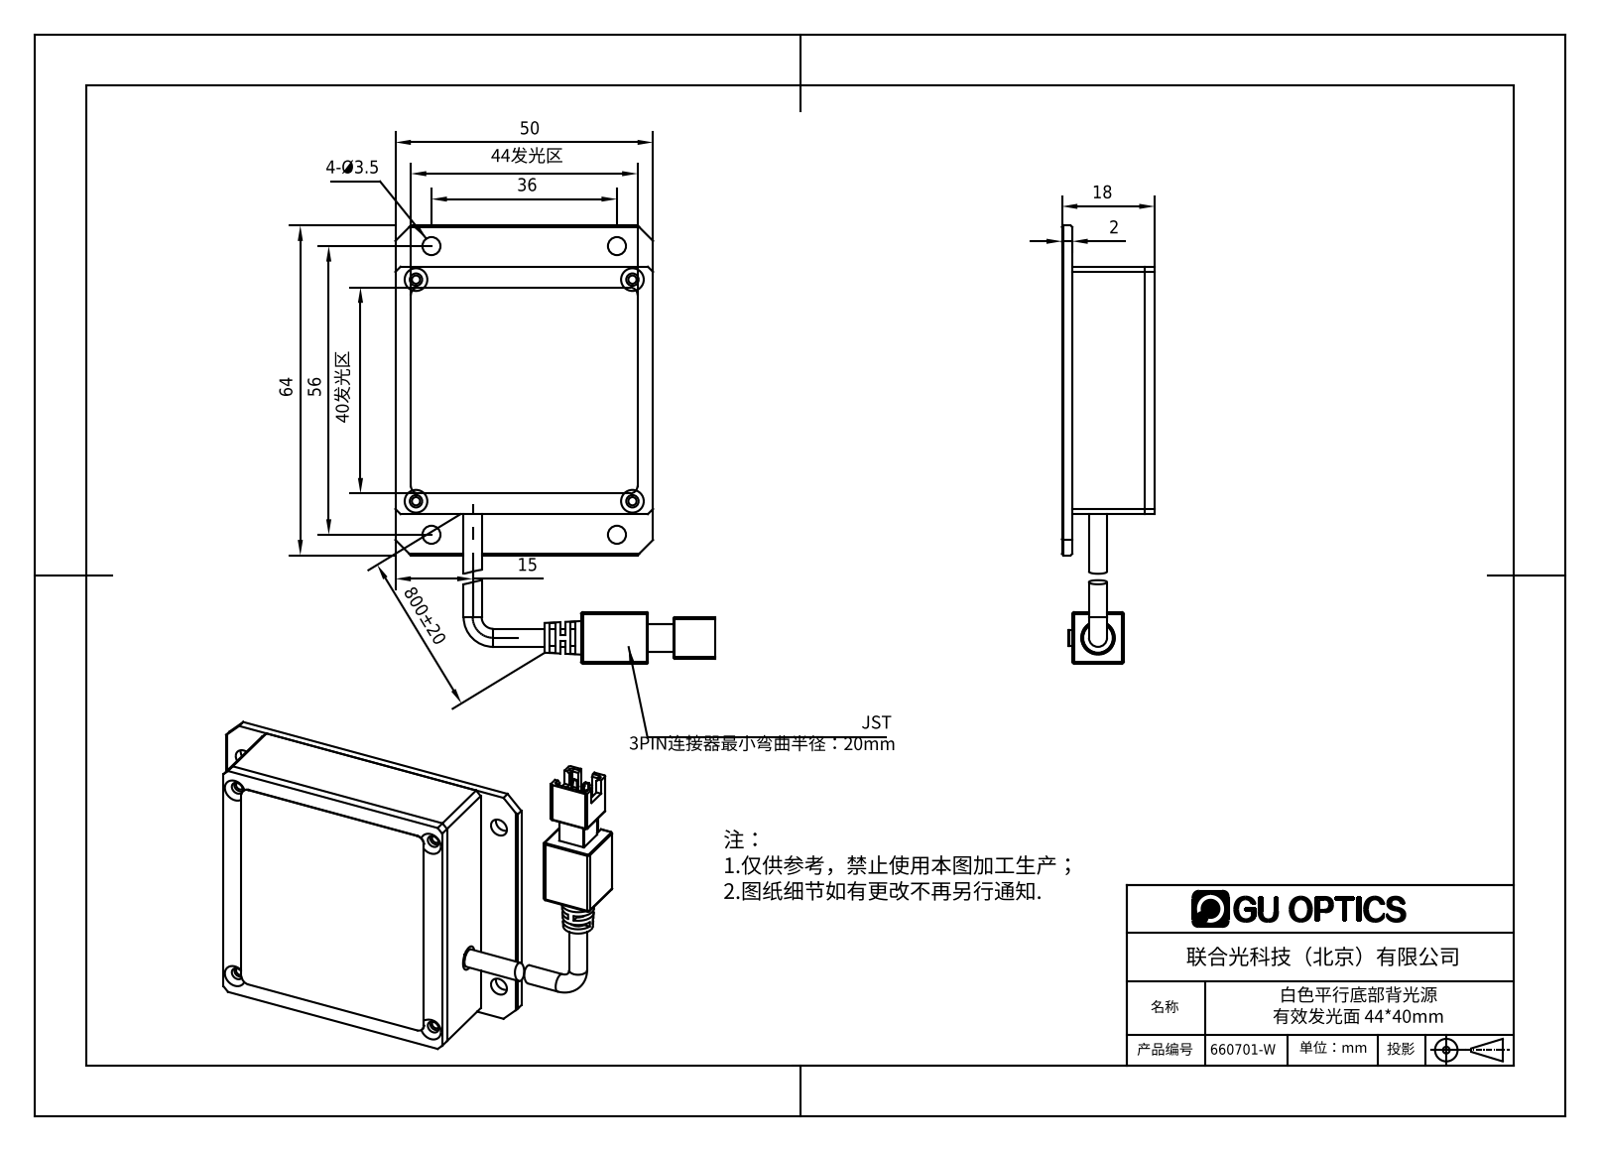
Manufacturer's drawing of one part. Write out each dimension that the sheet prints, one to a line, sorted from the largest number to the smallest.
800±20
64
56
50
44发光区
40发光区
36
18
15
2
